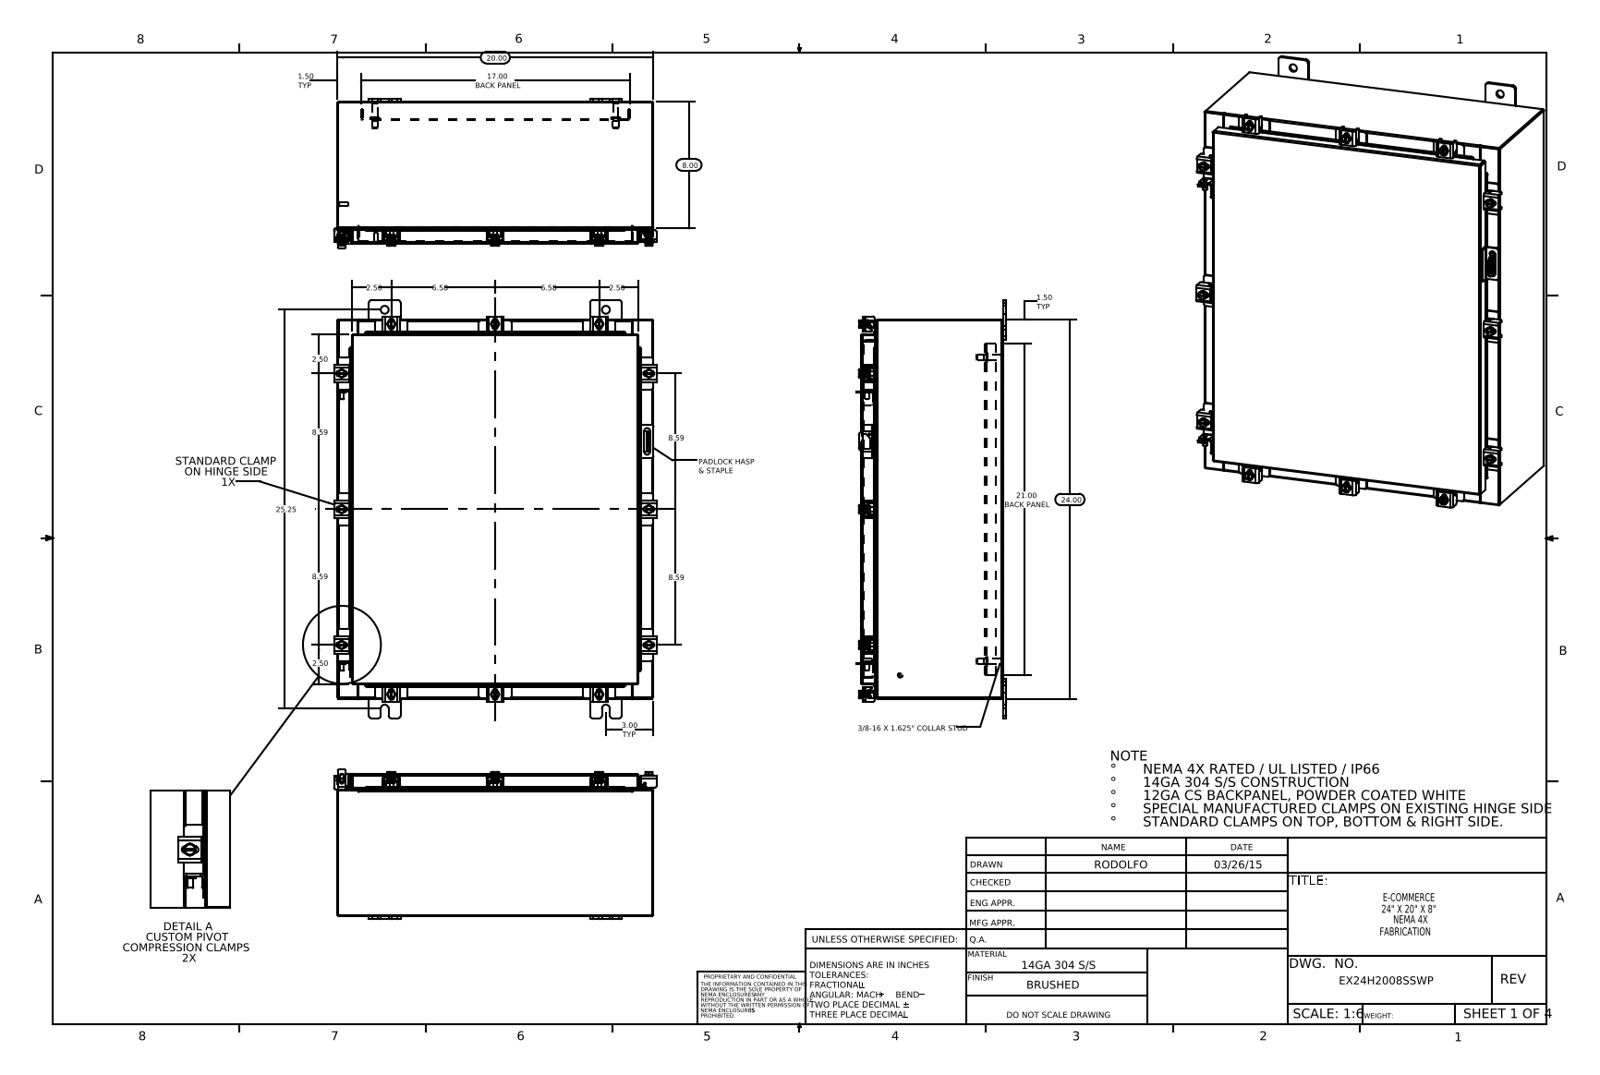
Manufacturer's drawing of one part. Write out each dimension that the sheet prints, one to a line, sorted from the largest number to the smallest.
25.25
24.00
21.00 BACK PANEL
20.00
17.00 BACK PANEL
8.59
8.59
8.59
8.59
8.00
6.58
6.58
3.00 TYP
2.50
2.50
2.50
2.50
1.50 TYP
1.50 TYP
